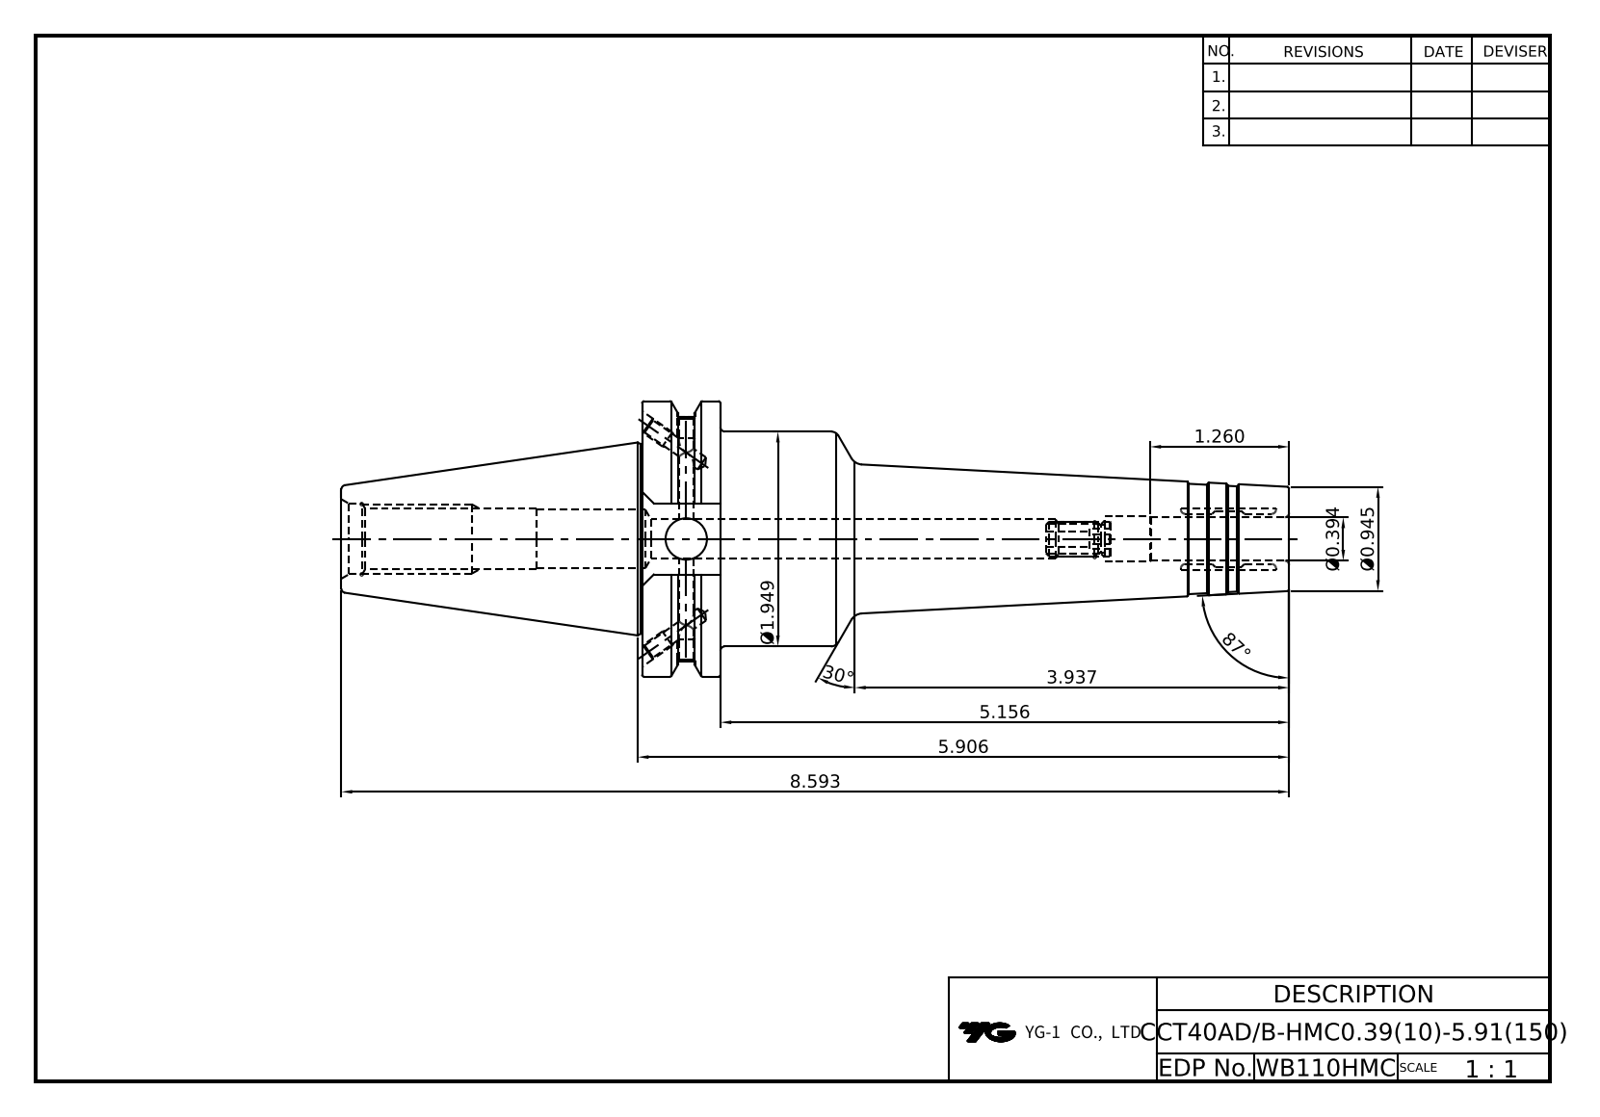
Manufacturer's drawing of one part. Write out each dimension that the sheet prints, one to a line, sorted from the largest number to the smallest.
87°
30°
8.593
5.906
5.156
3.937
Ø1.949
1.260
Ø0.945
Ø0.394
